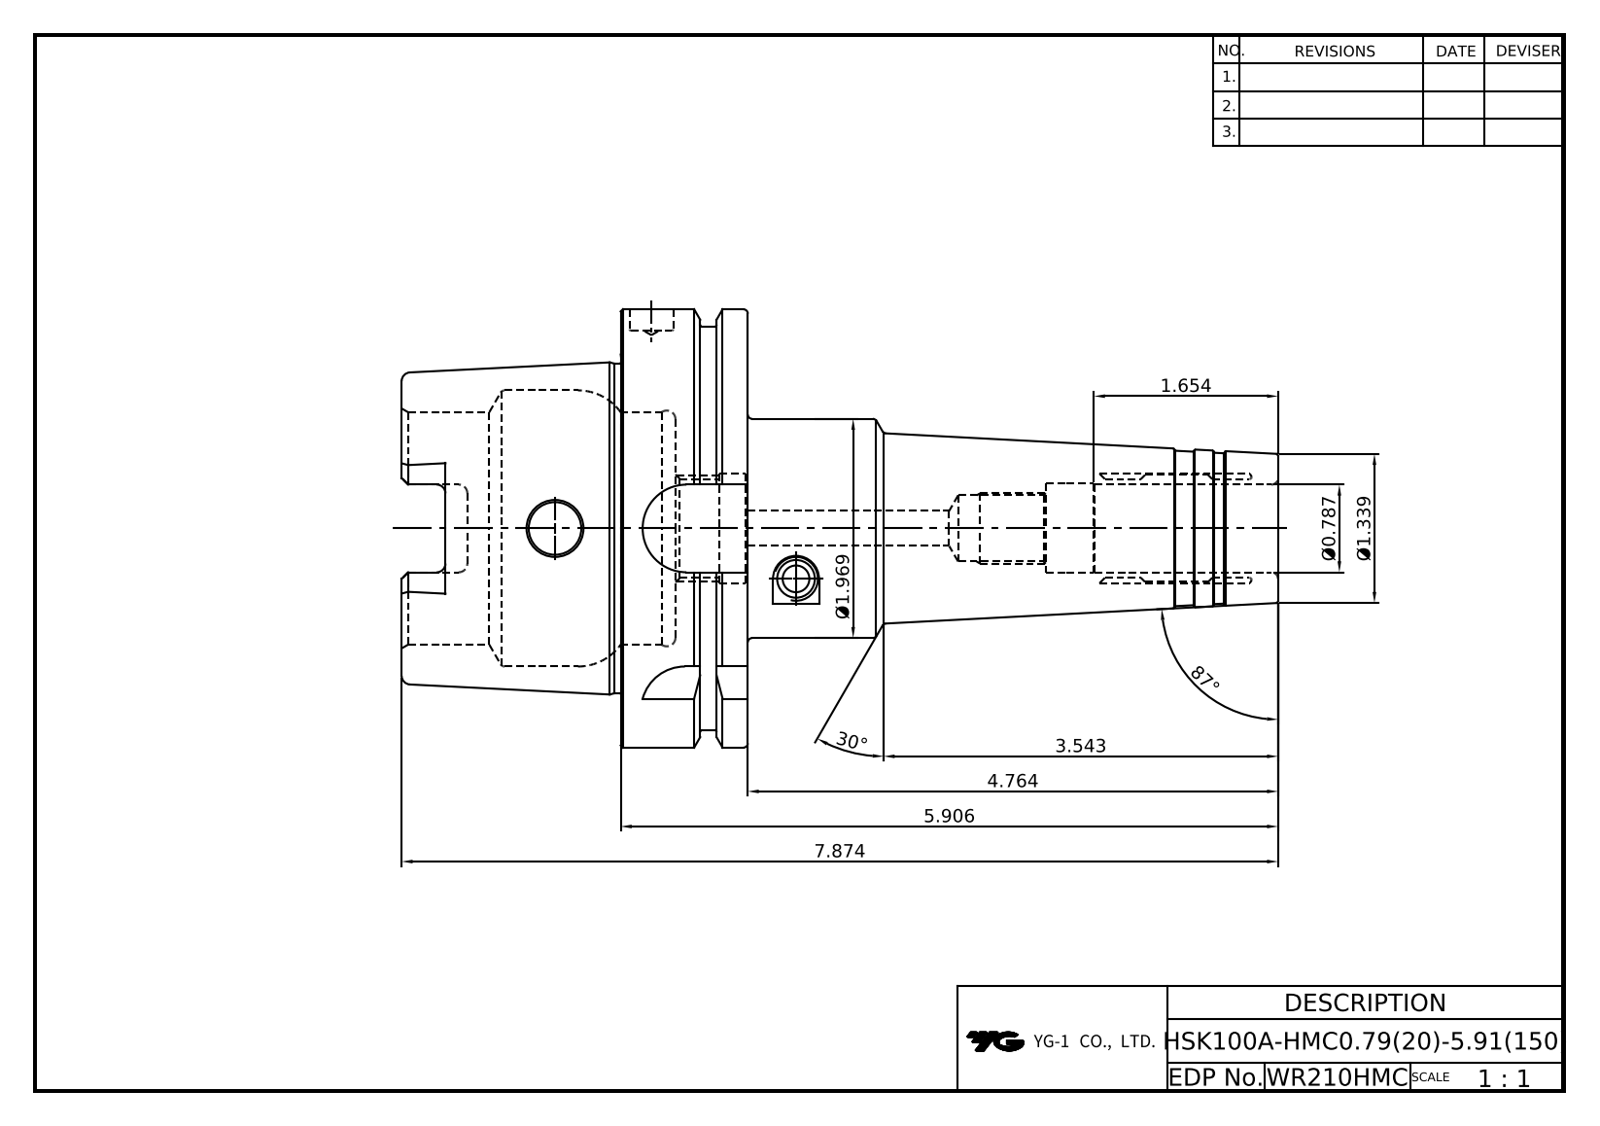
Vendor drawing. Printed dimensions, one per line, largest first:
87°
30°
7.874
5.906
4.764
3.543
Ø1.969
1.654
Ø1.339
Ø0.787
